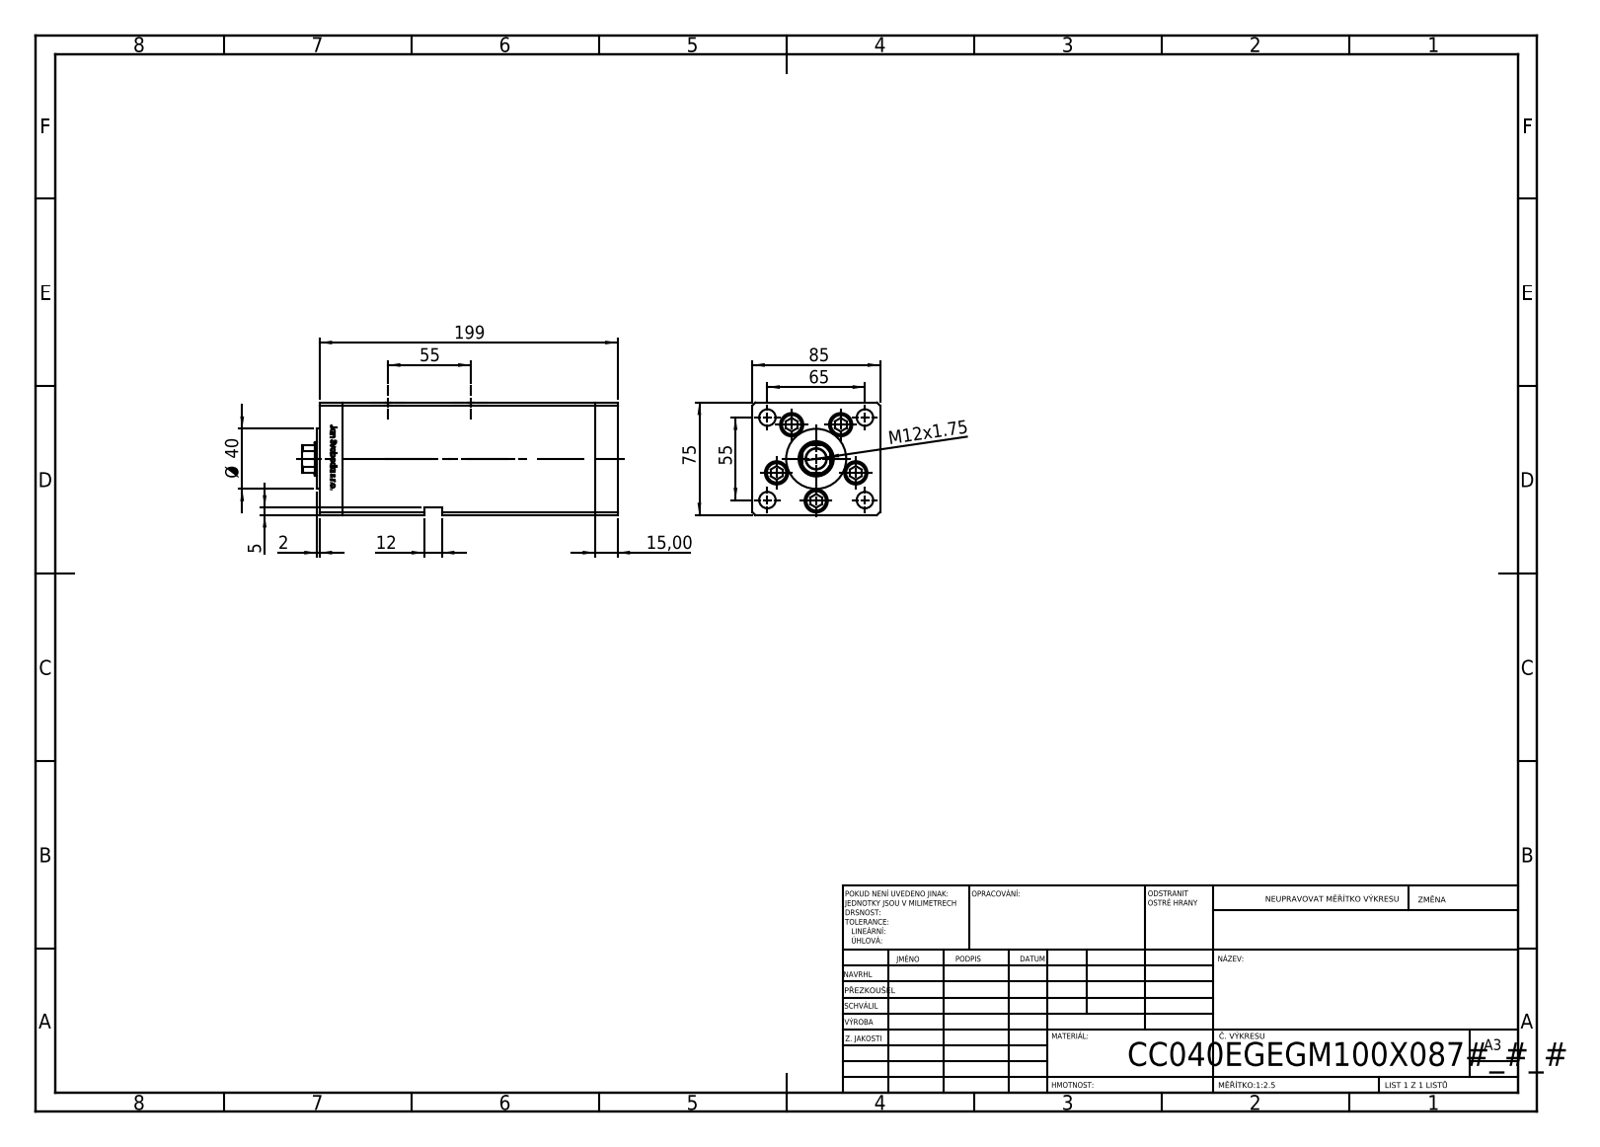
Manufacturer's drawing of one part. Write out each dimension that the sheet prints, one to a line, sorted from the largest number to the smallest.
199
85
75
65
55
55
Ø 40
15,00
12
M12x1.75
5
2
